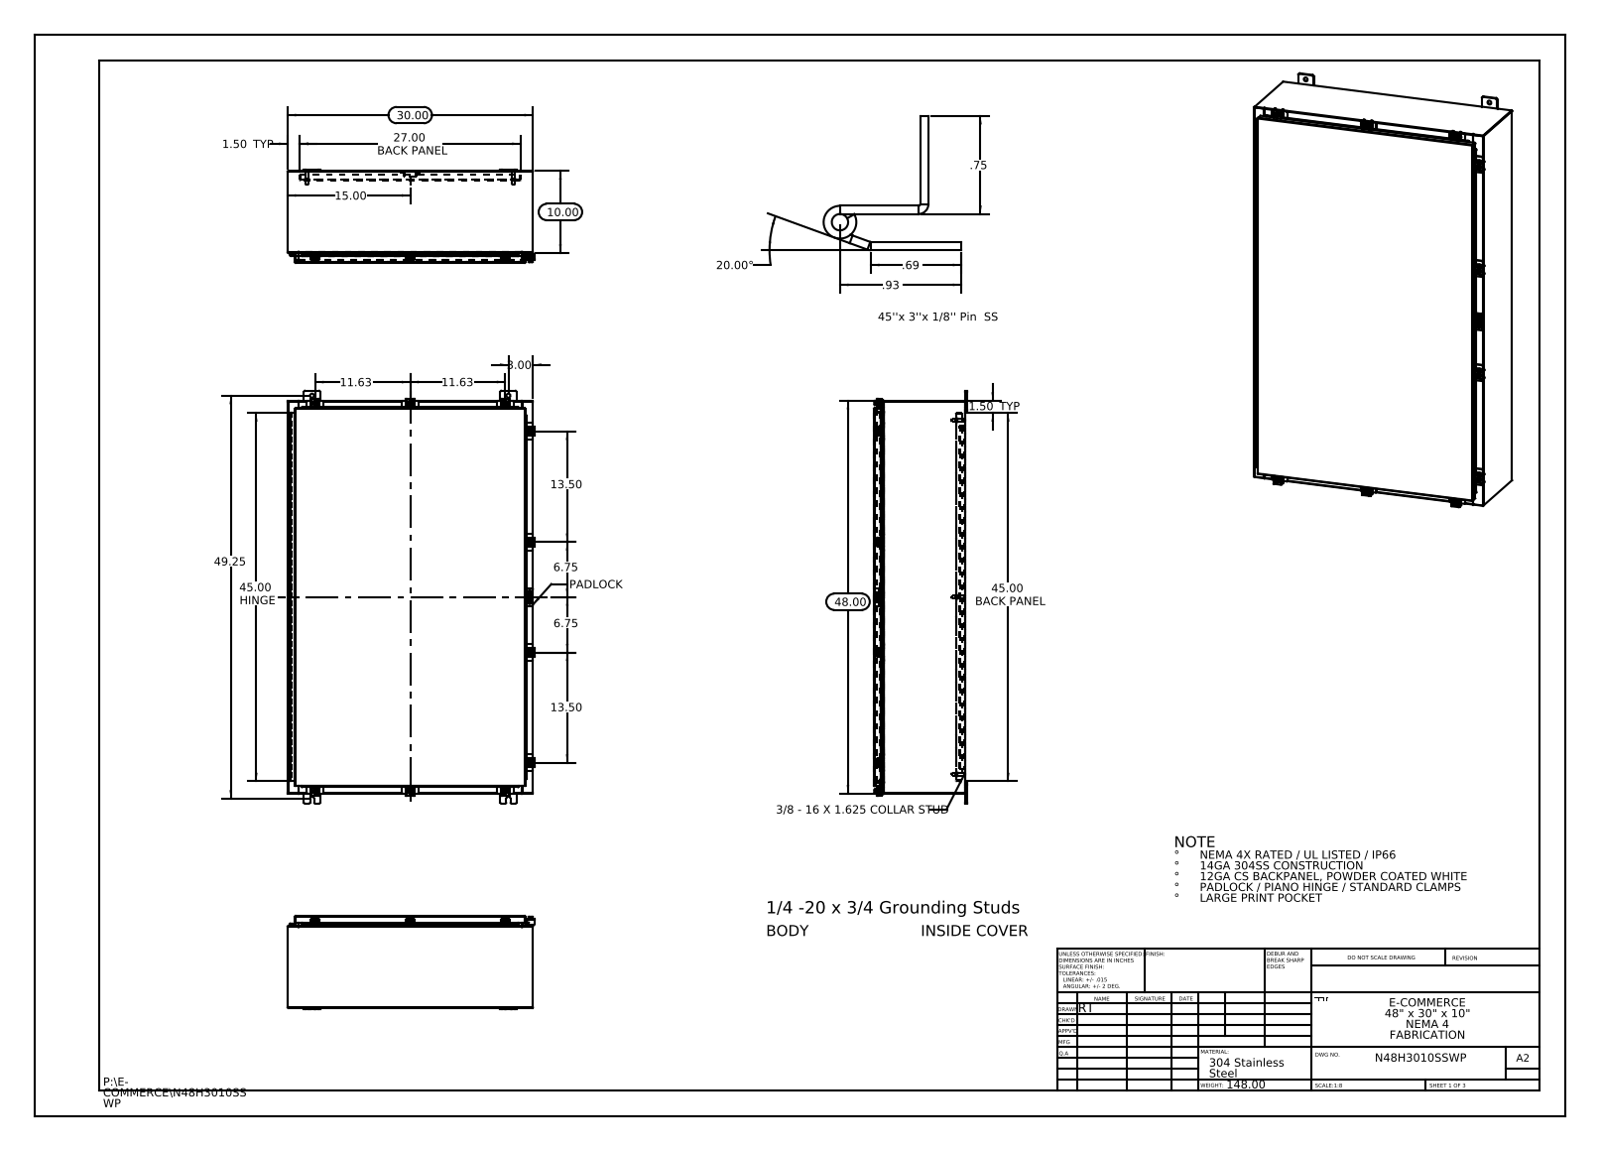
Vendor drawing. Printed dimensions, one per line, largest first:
49.25
48.00
45.00 HINGE
45.00 BACK PANEL
30.00
27.00 BACK PANEL
20.00°
15.00
13.50
13.50
11.63
11.63
10.00
6.75
6.75
3.00
1.50 TYP
1.50 TYP
.93
.75
.69
